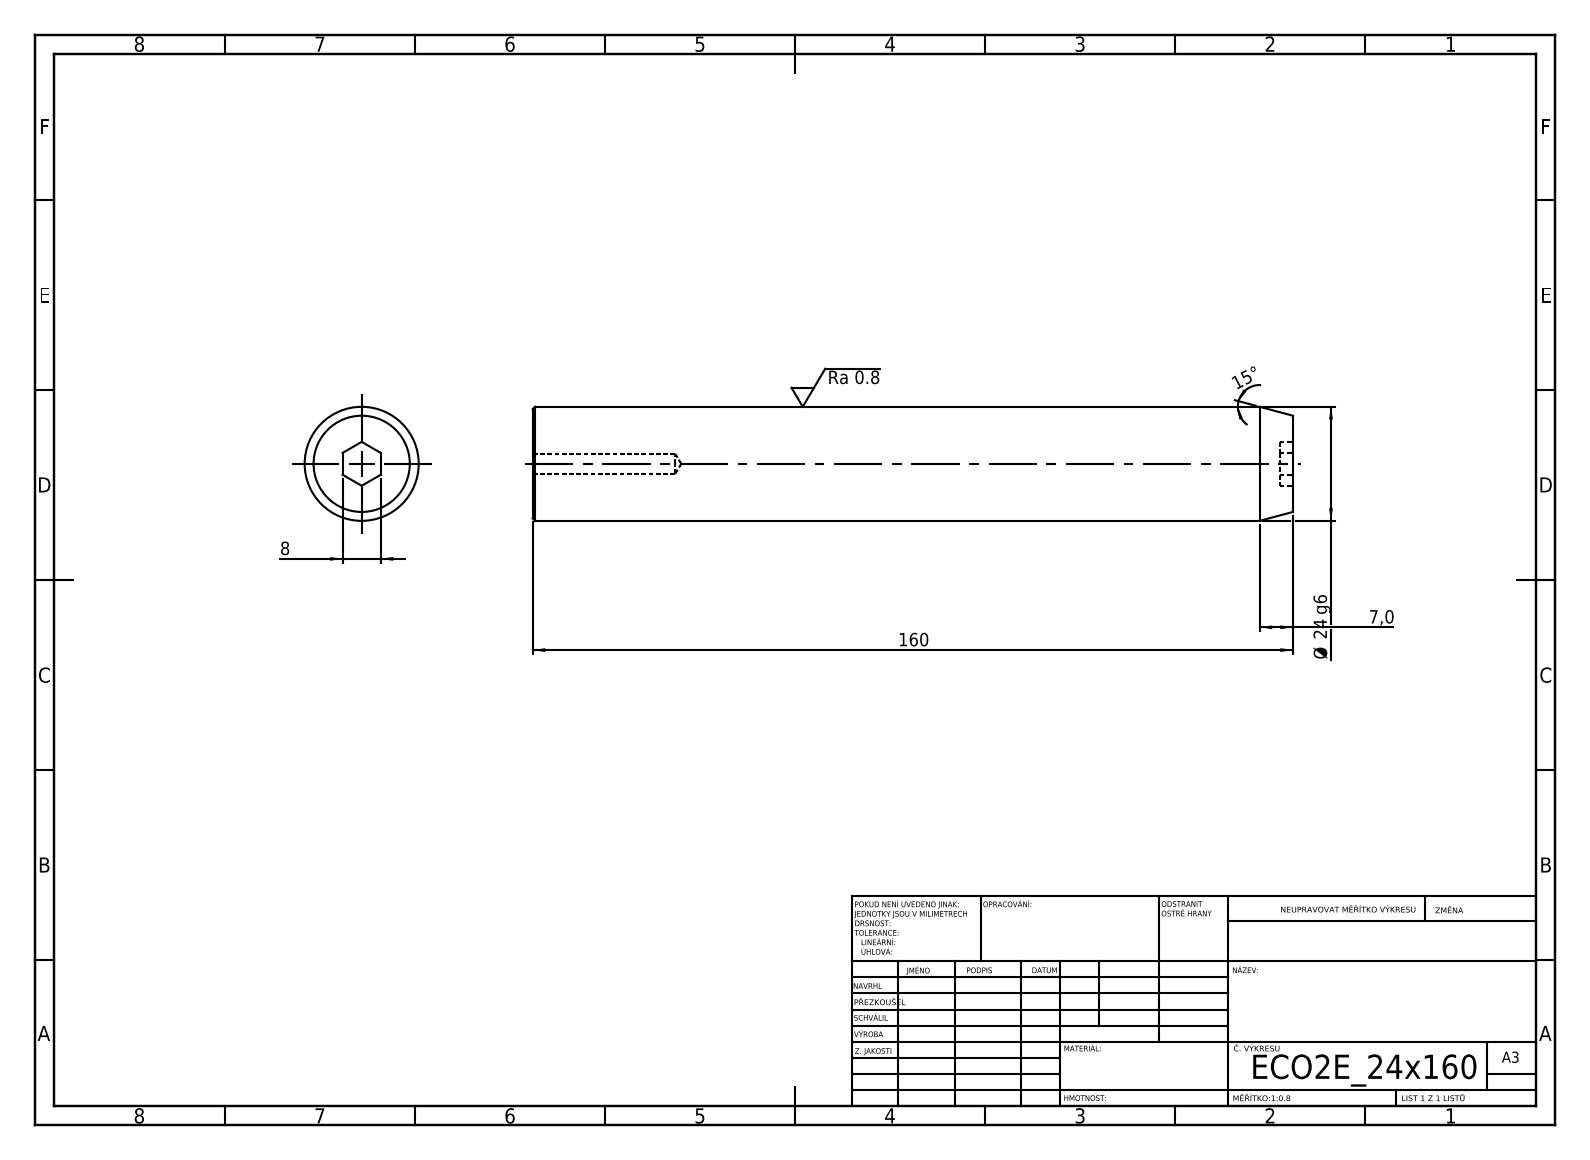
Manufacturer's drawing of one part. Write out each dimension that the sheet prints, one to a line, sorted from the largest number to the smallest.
160
Ø 24 g6
15°
8
7,0
